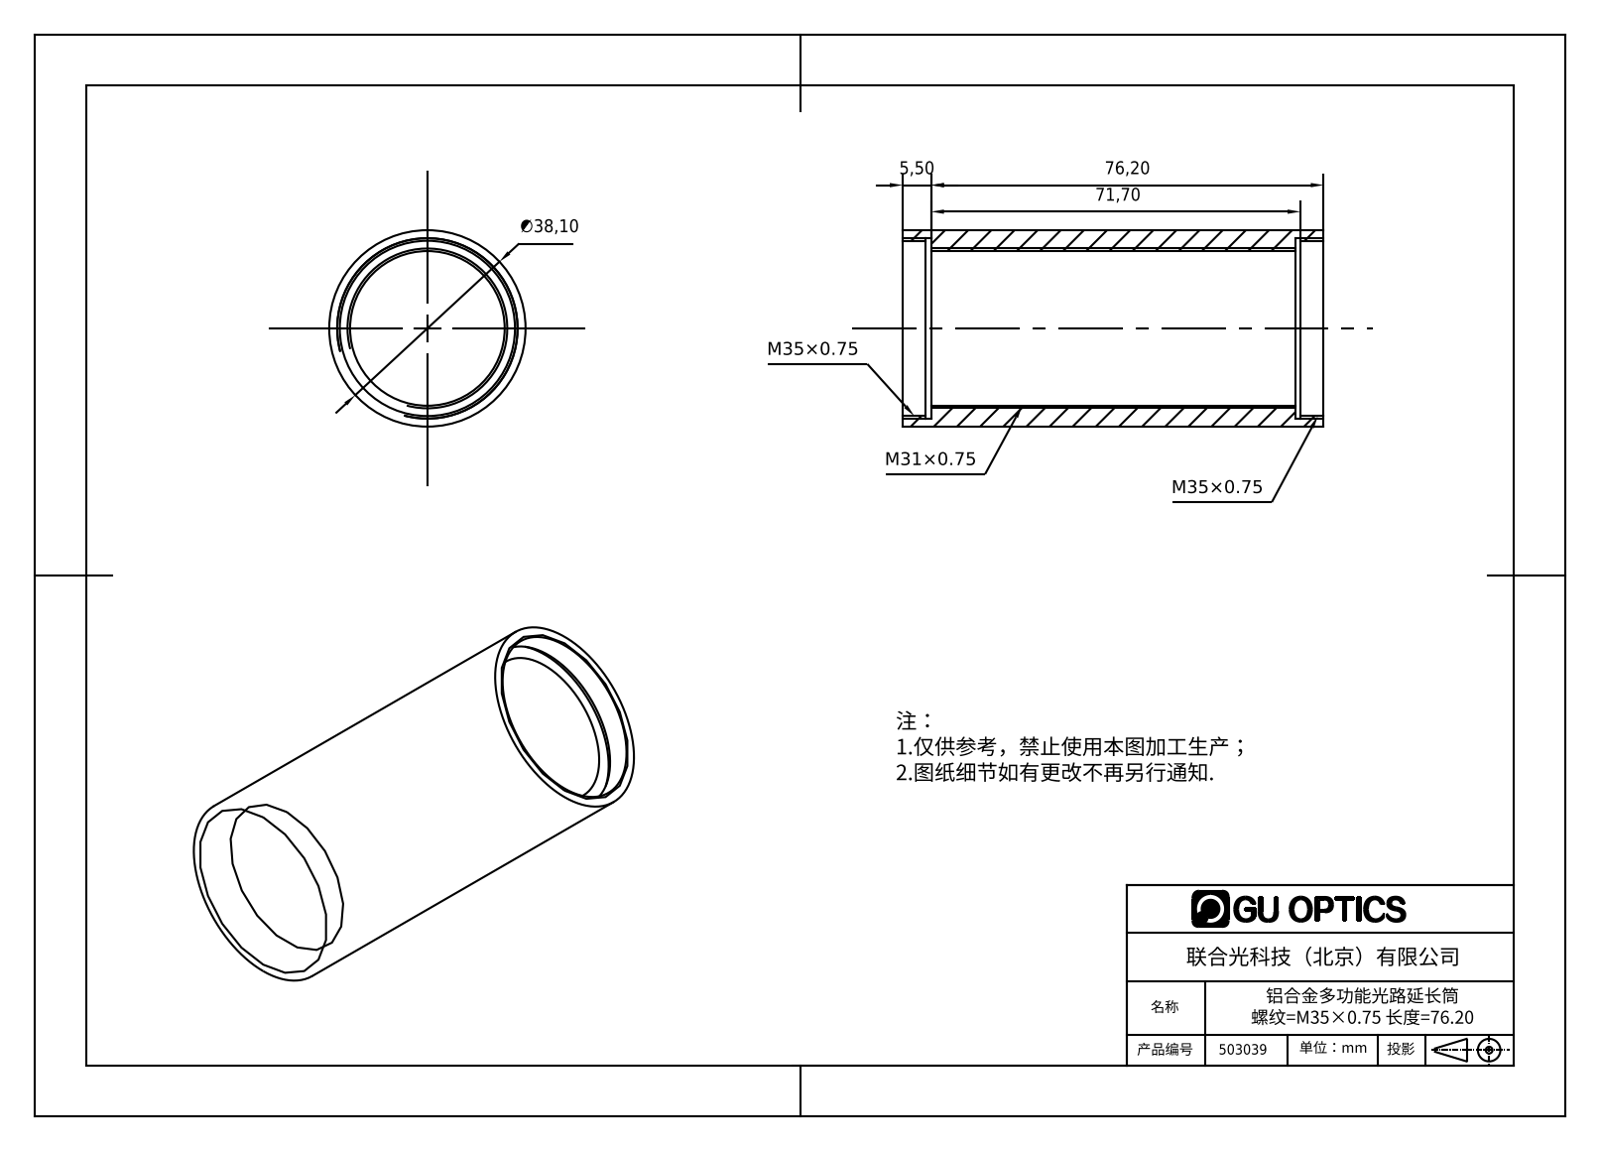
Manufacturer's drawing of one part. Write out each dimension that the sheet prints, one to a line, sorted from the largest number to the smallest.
76,20
71,70
∅38,10
5,50
